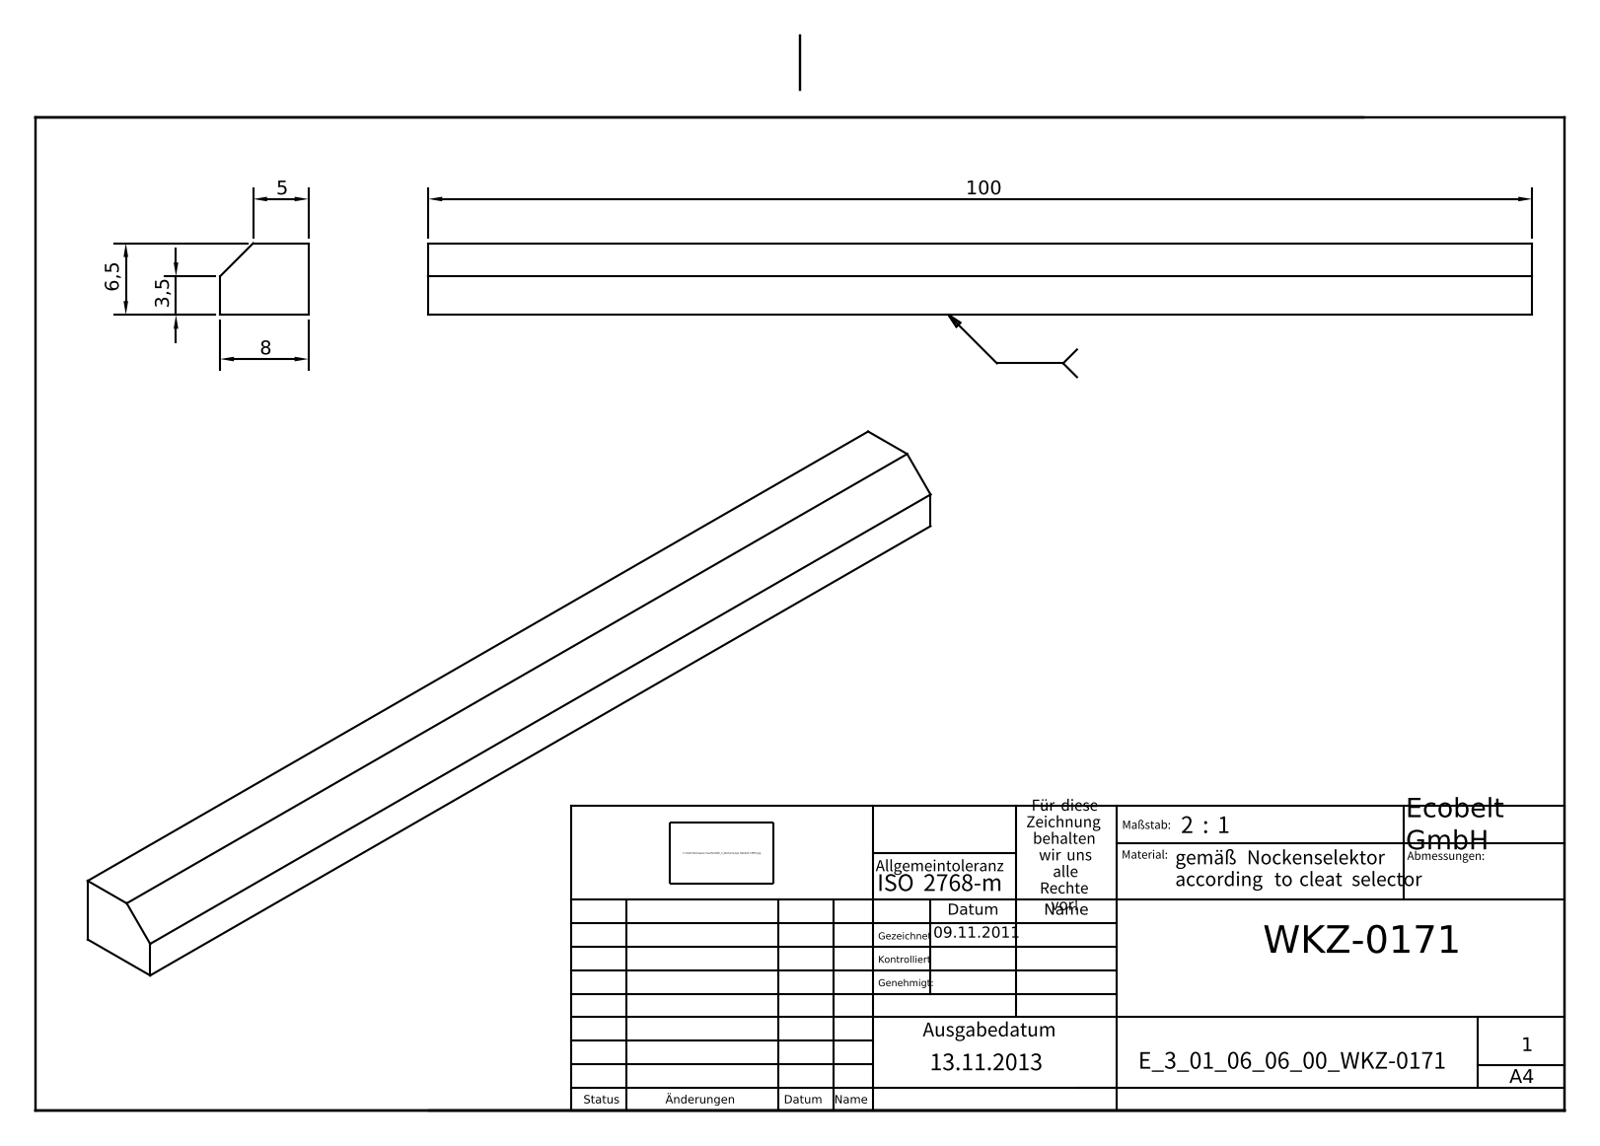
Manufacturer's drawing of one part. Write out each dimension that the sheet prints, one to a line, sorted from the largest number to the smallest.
100
8
6,5
5
3,5
